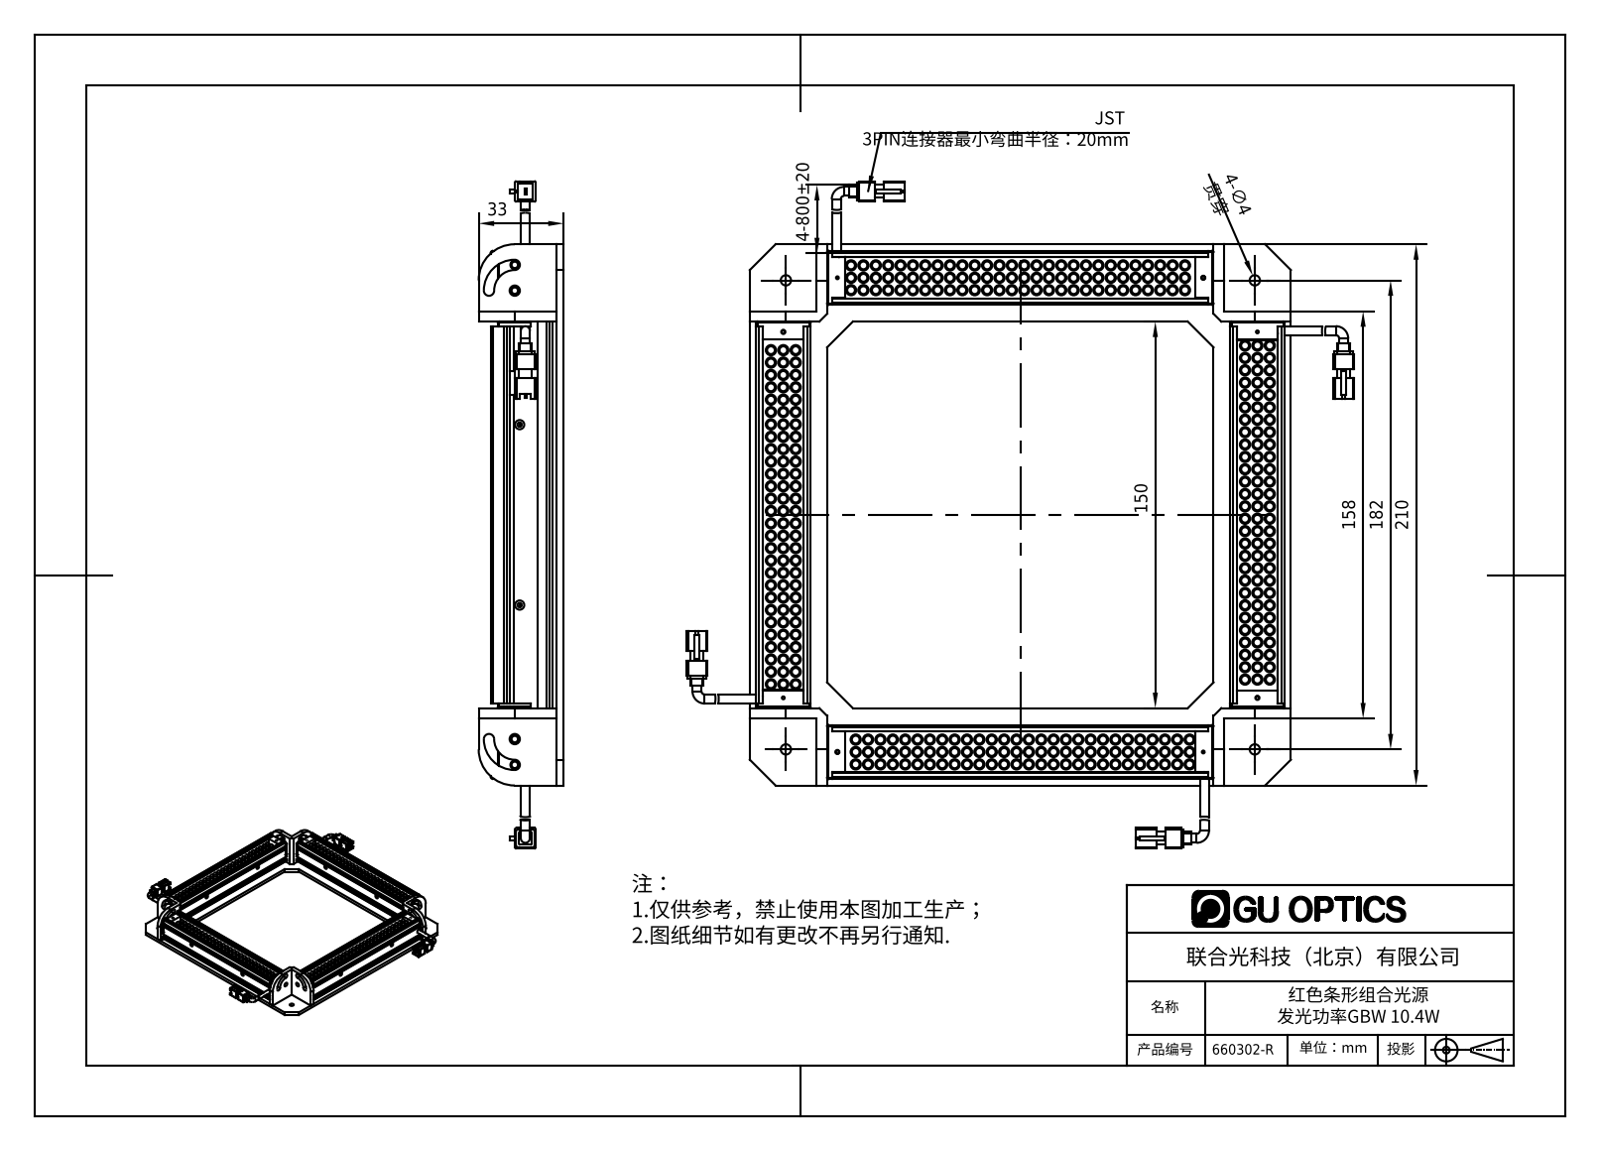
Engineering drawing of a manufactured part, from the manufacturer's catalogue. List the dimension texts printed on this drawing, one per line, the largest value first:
210
182
158
150
33
4-800±20
4-∅4 贯穿
